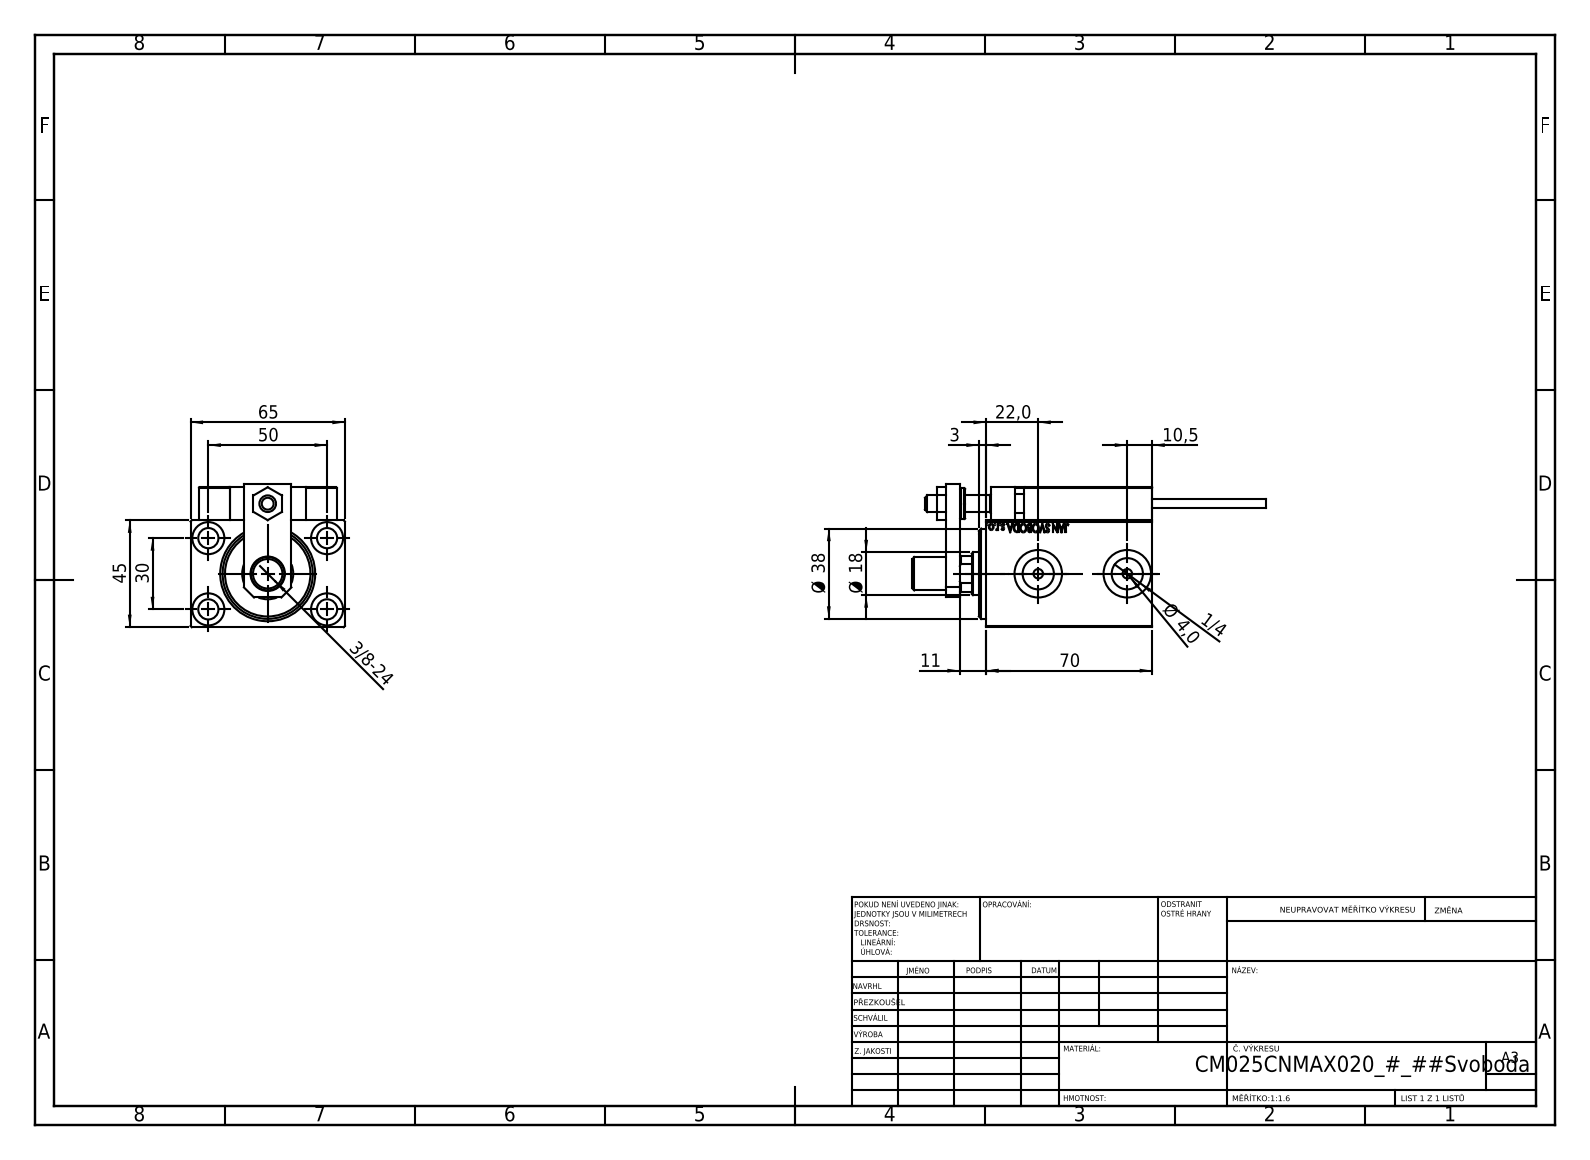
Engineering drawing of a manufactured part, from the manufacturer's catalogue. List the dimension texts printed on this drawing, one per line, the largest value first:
70
65
50
45
Ø 38
30
22,0
Ø 18
11
10,5
Ø 4,0
3
3/8-24
1/4
